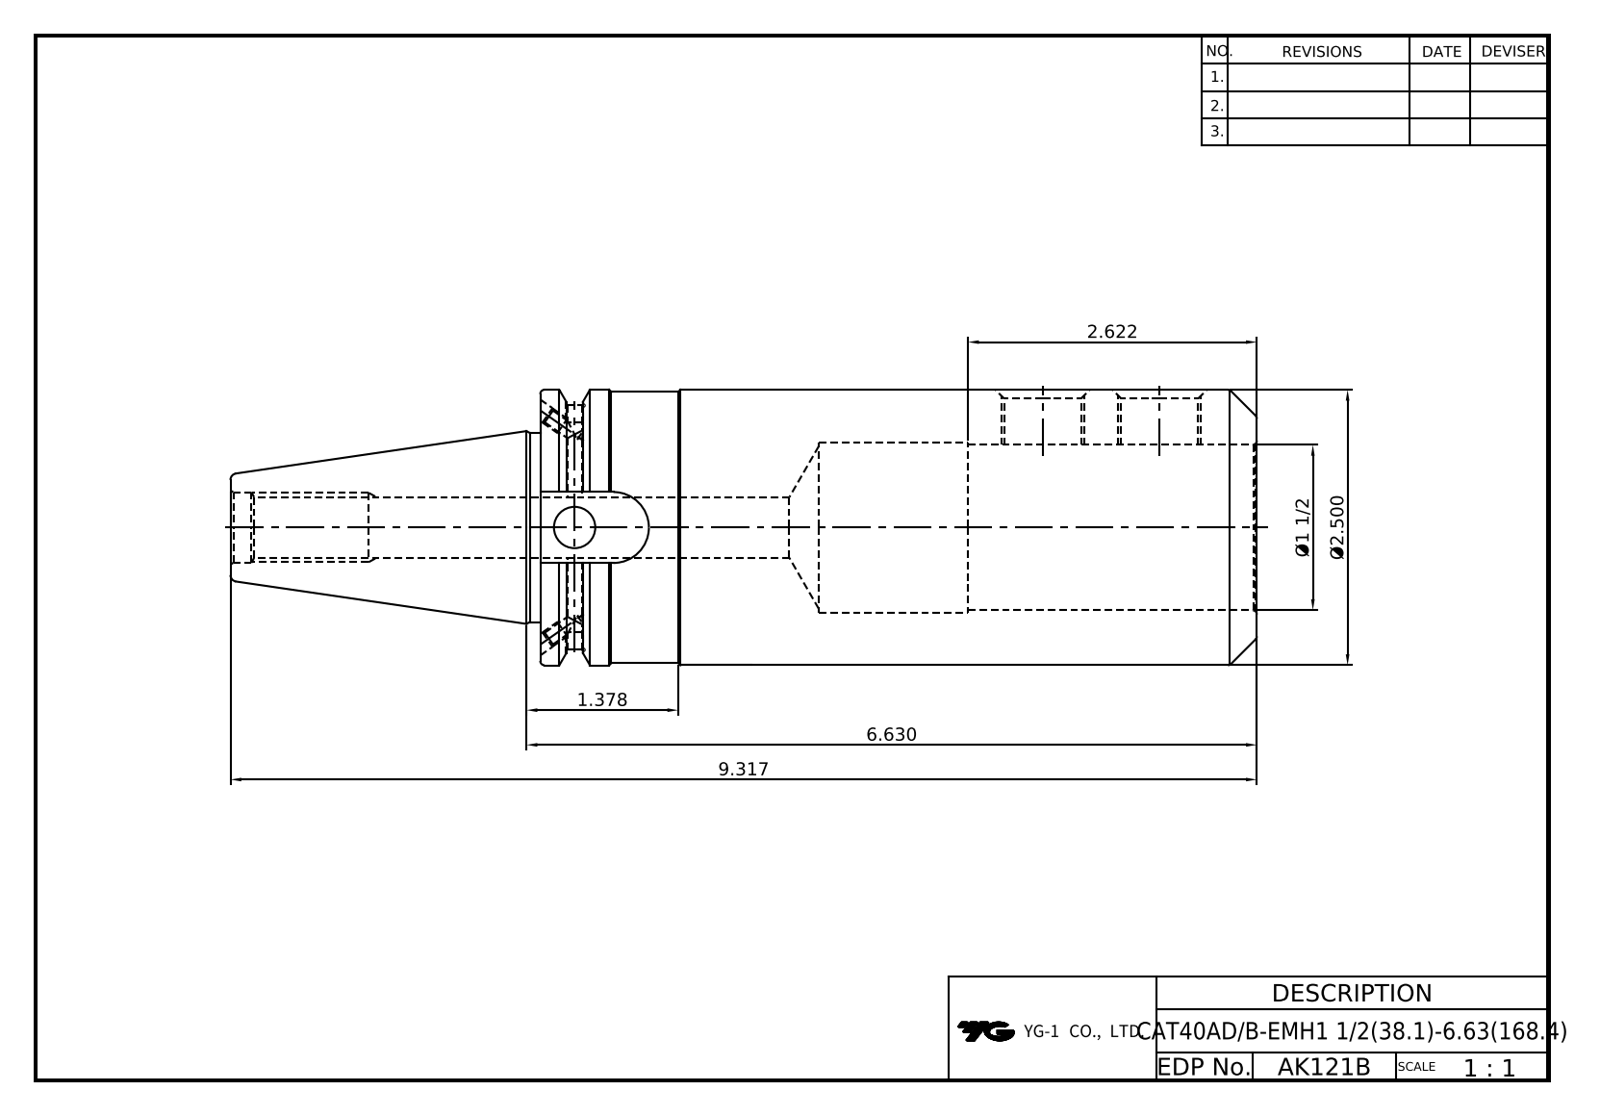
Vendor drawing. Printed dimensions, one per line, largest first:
9.317
6.630
2.622
Ø2.500
Ø1 1/2
1.378
